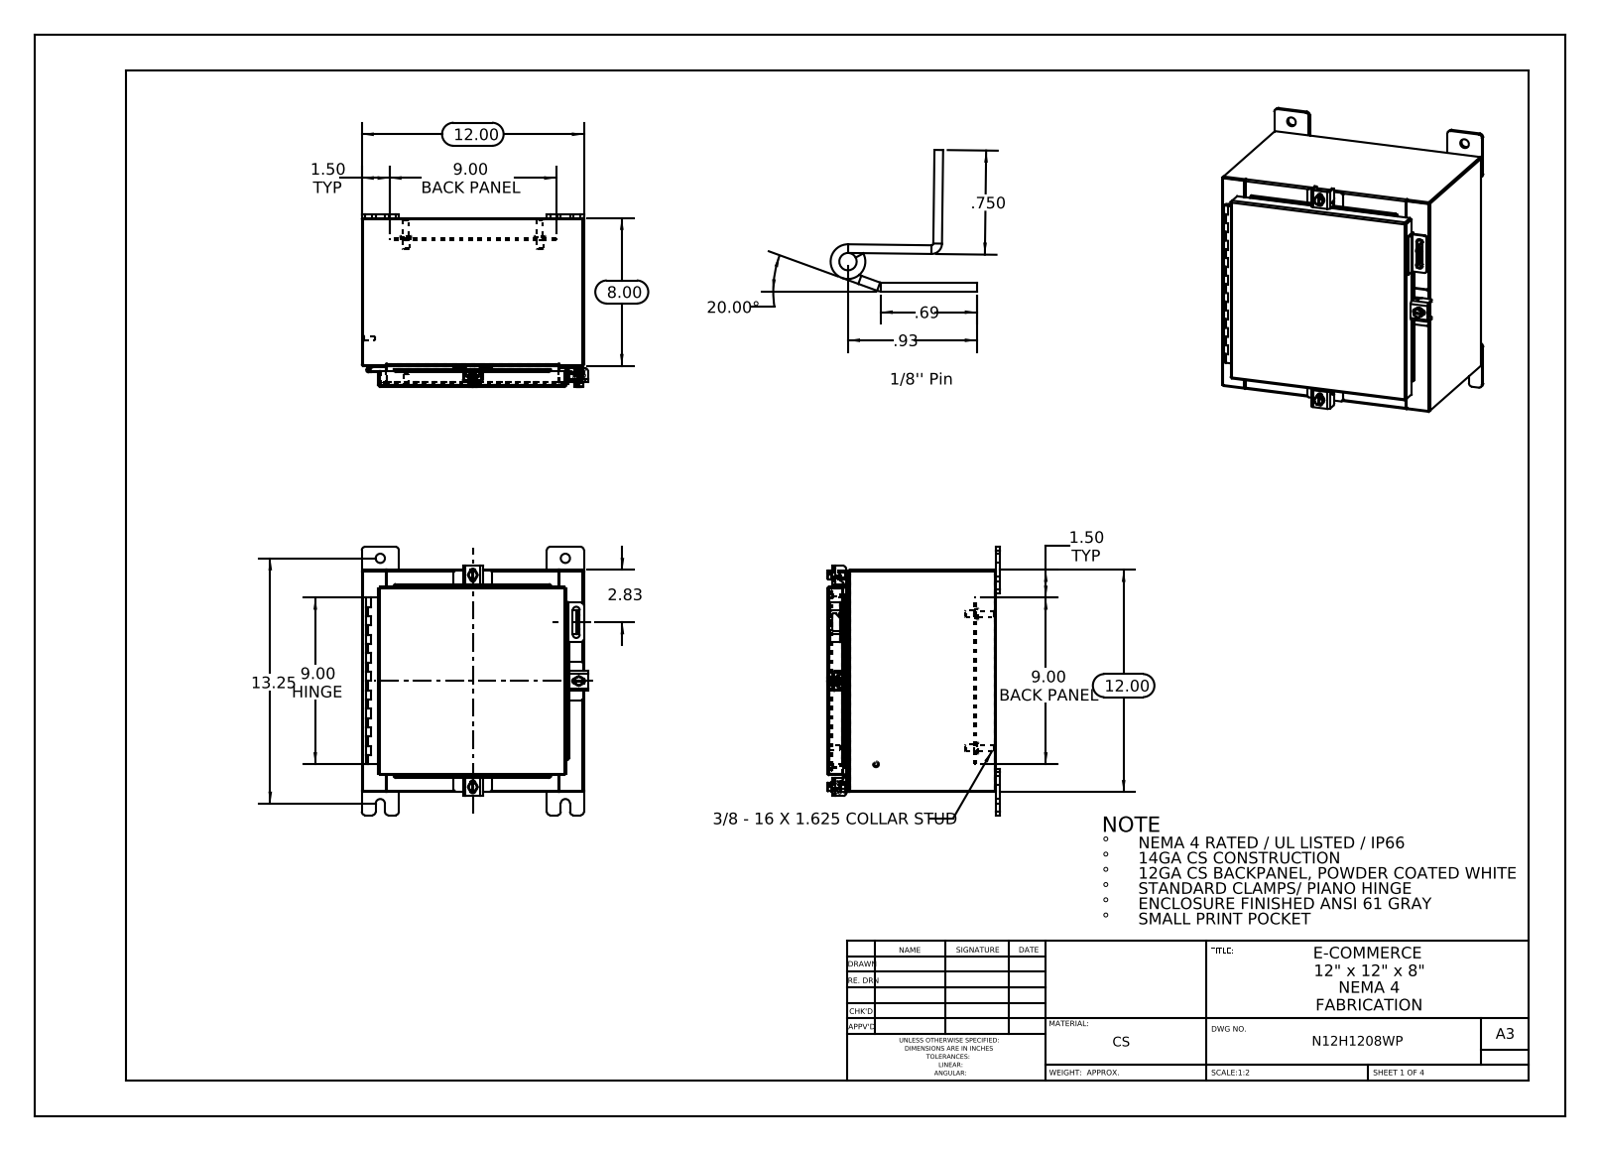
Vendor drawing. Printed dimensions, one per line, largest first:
20.00°
13.25
12.00
12.00
9.00 HINGE
9.00 BACK PANEL
9.00 BACK PANEL
8.00
2.83
1.50 TYP
1.50 TYP
.93
.750
.69
